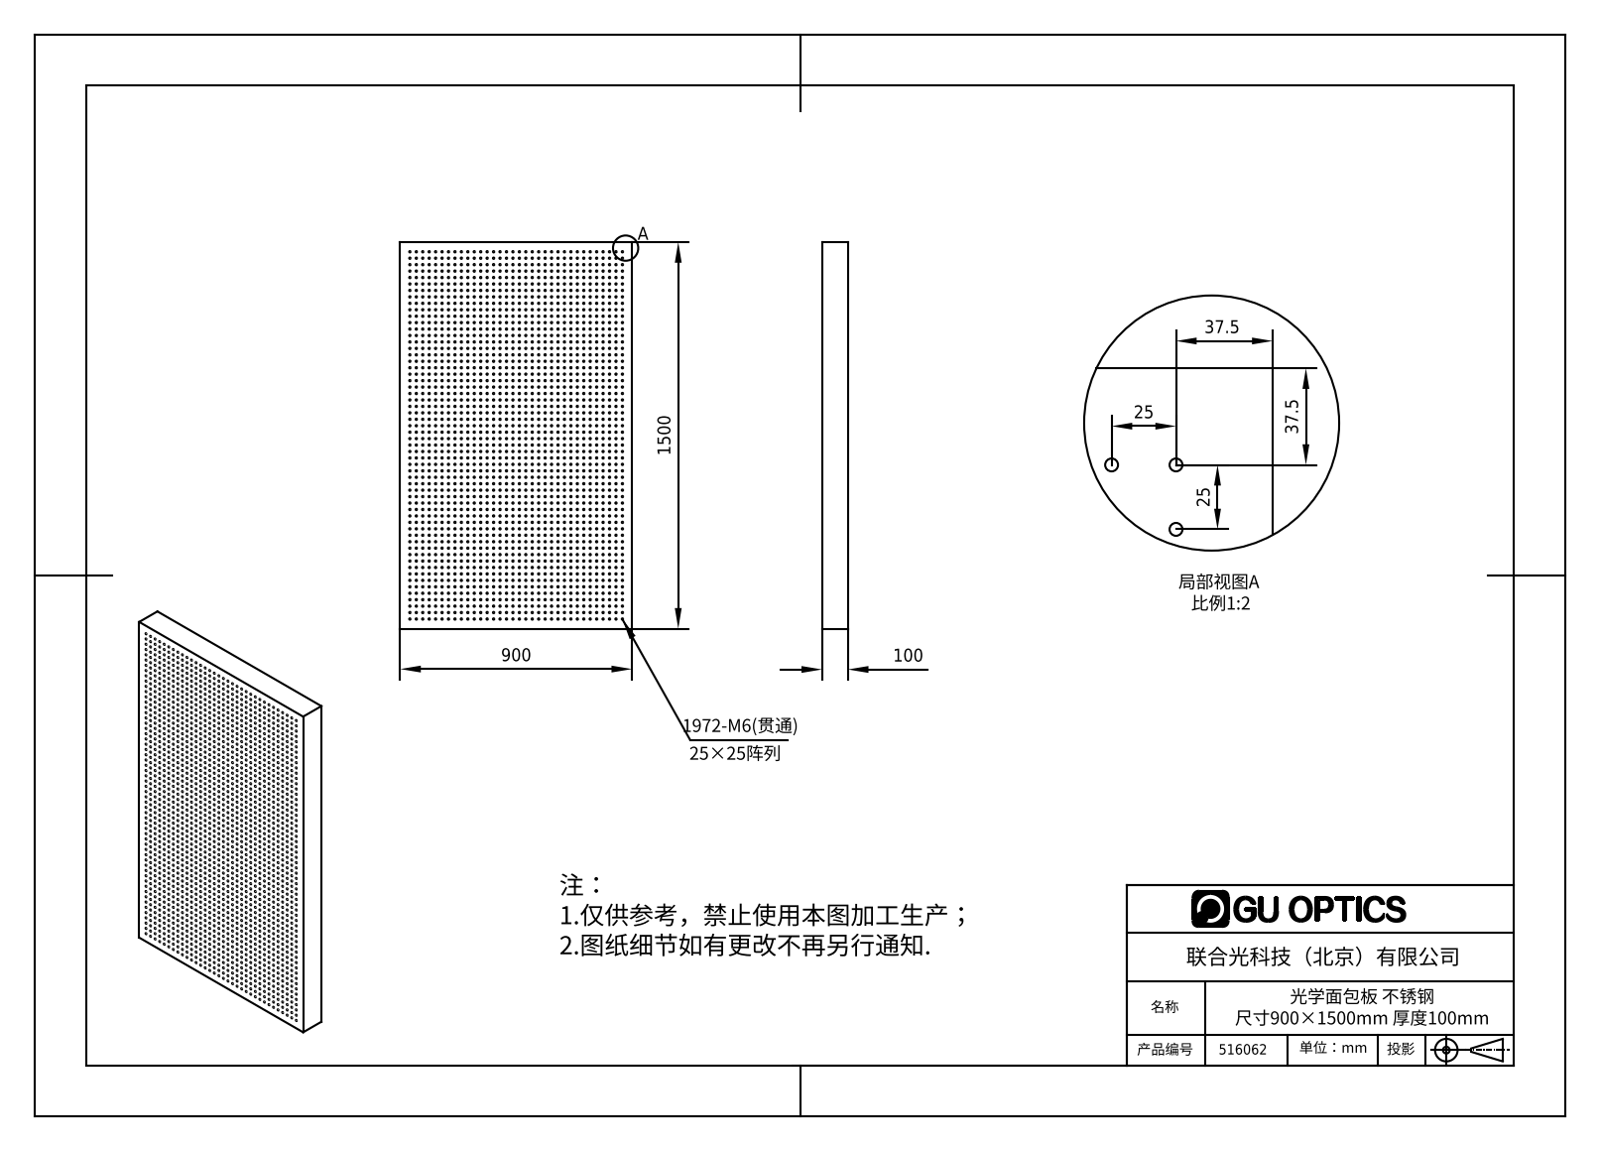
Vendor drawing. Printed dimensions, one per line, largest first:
1500
900
100
37.5
37.5
25
25
